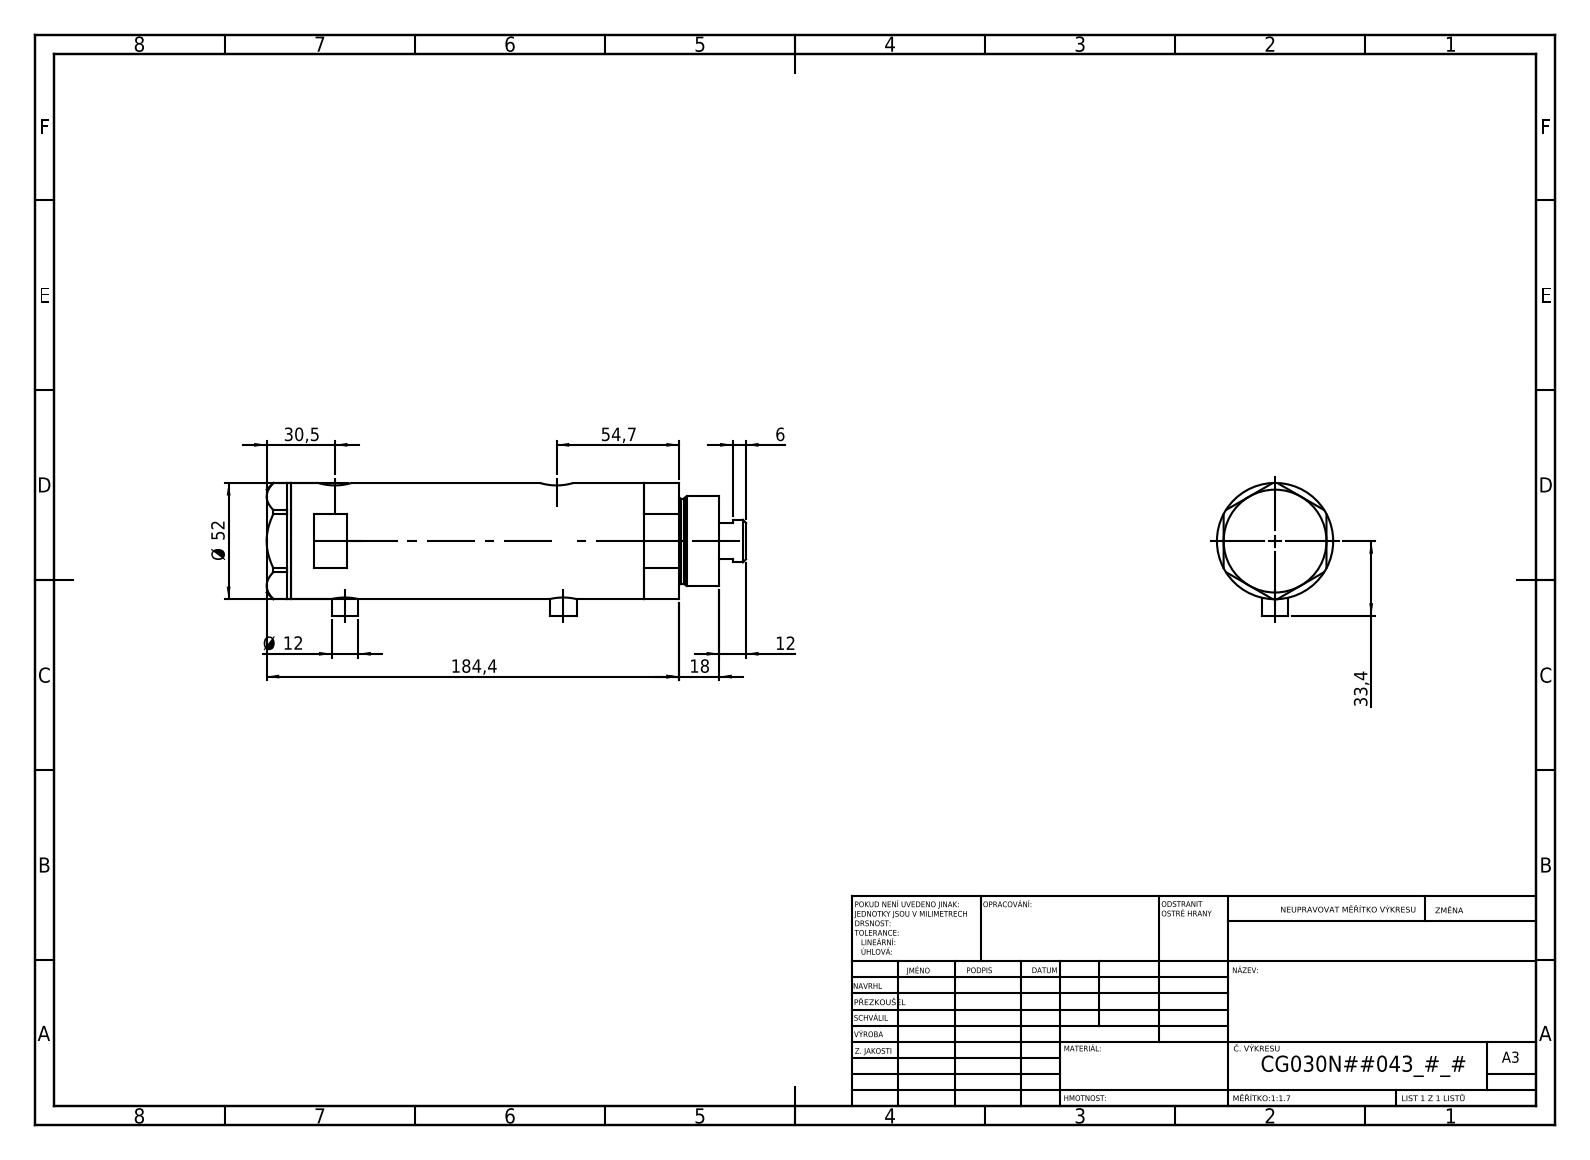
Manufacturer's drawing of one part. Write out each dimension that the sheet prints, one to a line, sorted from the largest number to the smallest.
184,4
54,7
Ø 52
33,4
30,5
18
12
Ø 12
6
